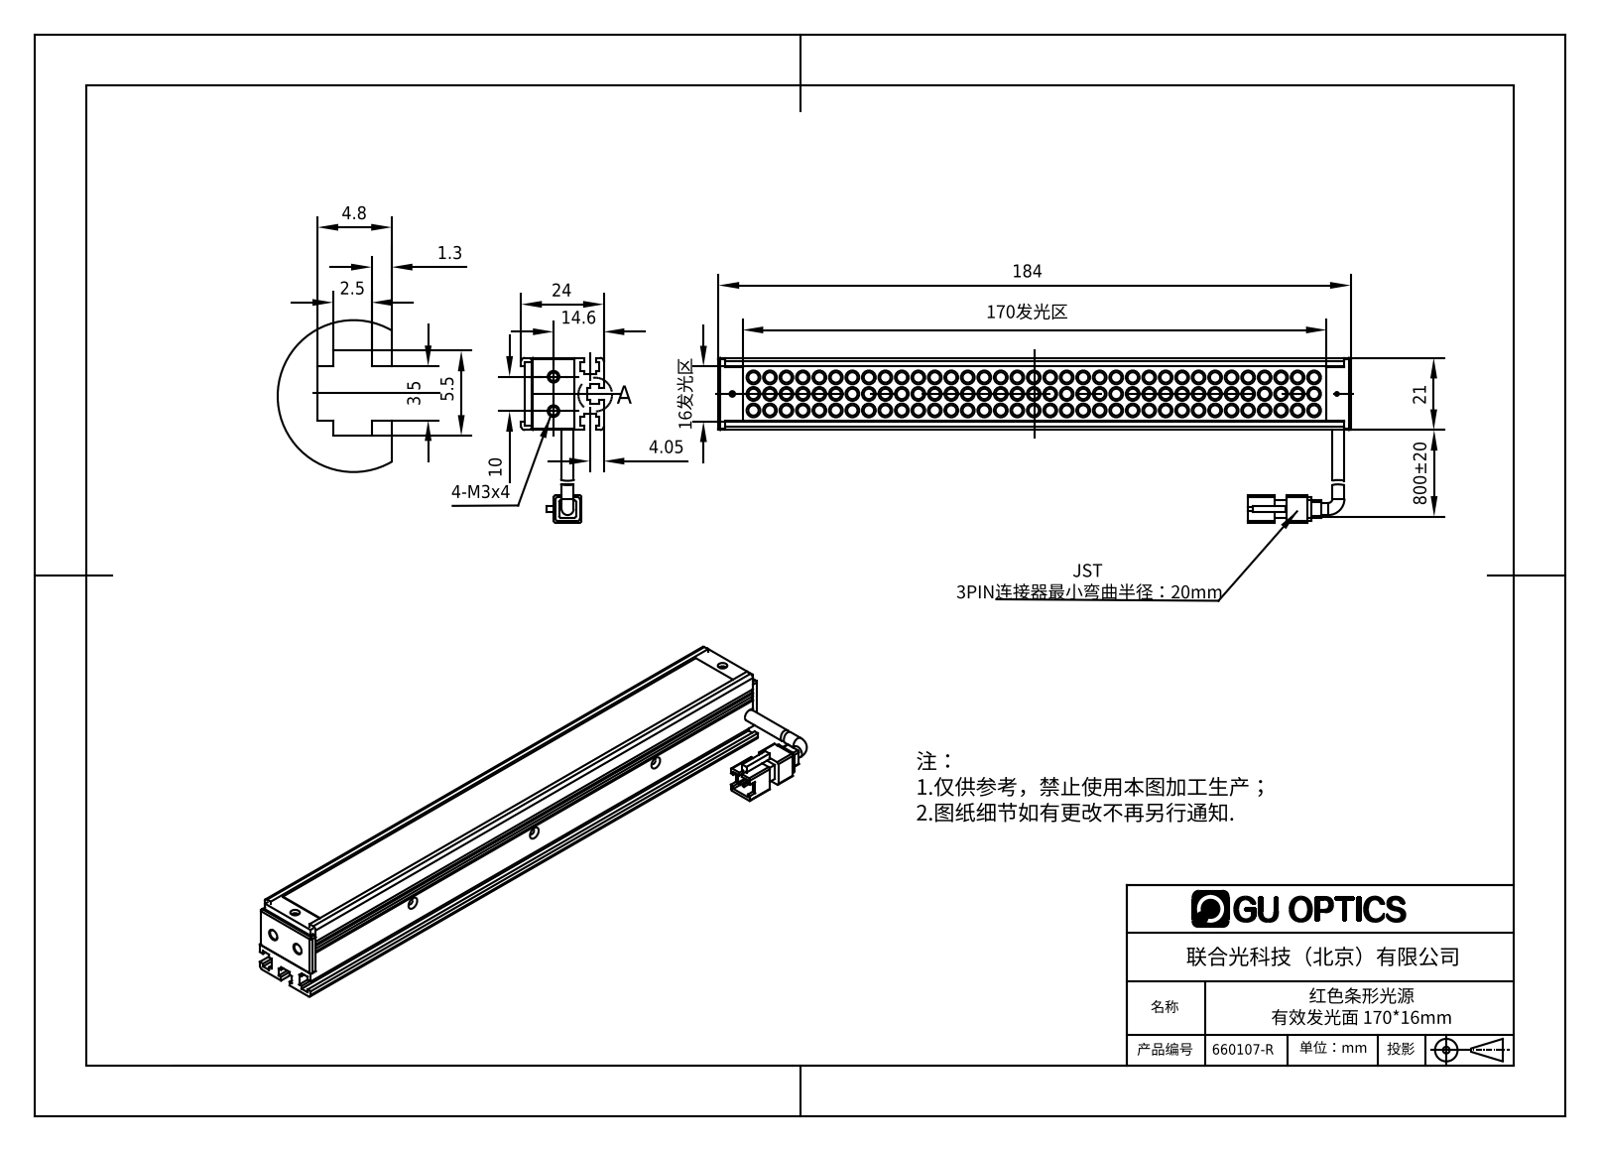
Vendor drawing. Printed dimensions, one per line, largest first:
800±20
184
170发光区
24
21
16发光区
14.6
10
5.5
4.8
4.05
3.5
2.5
1.3
